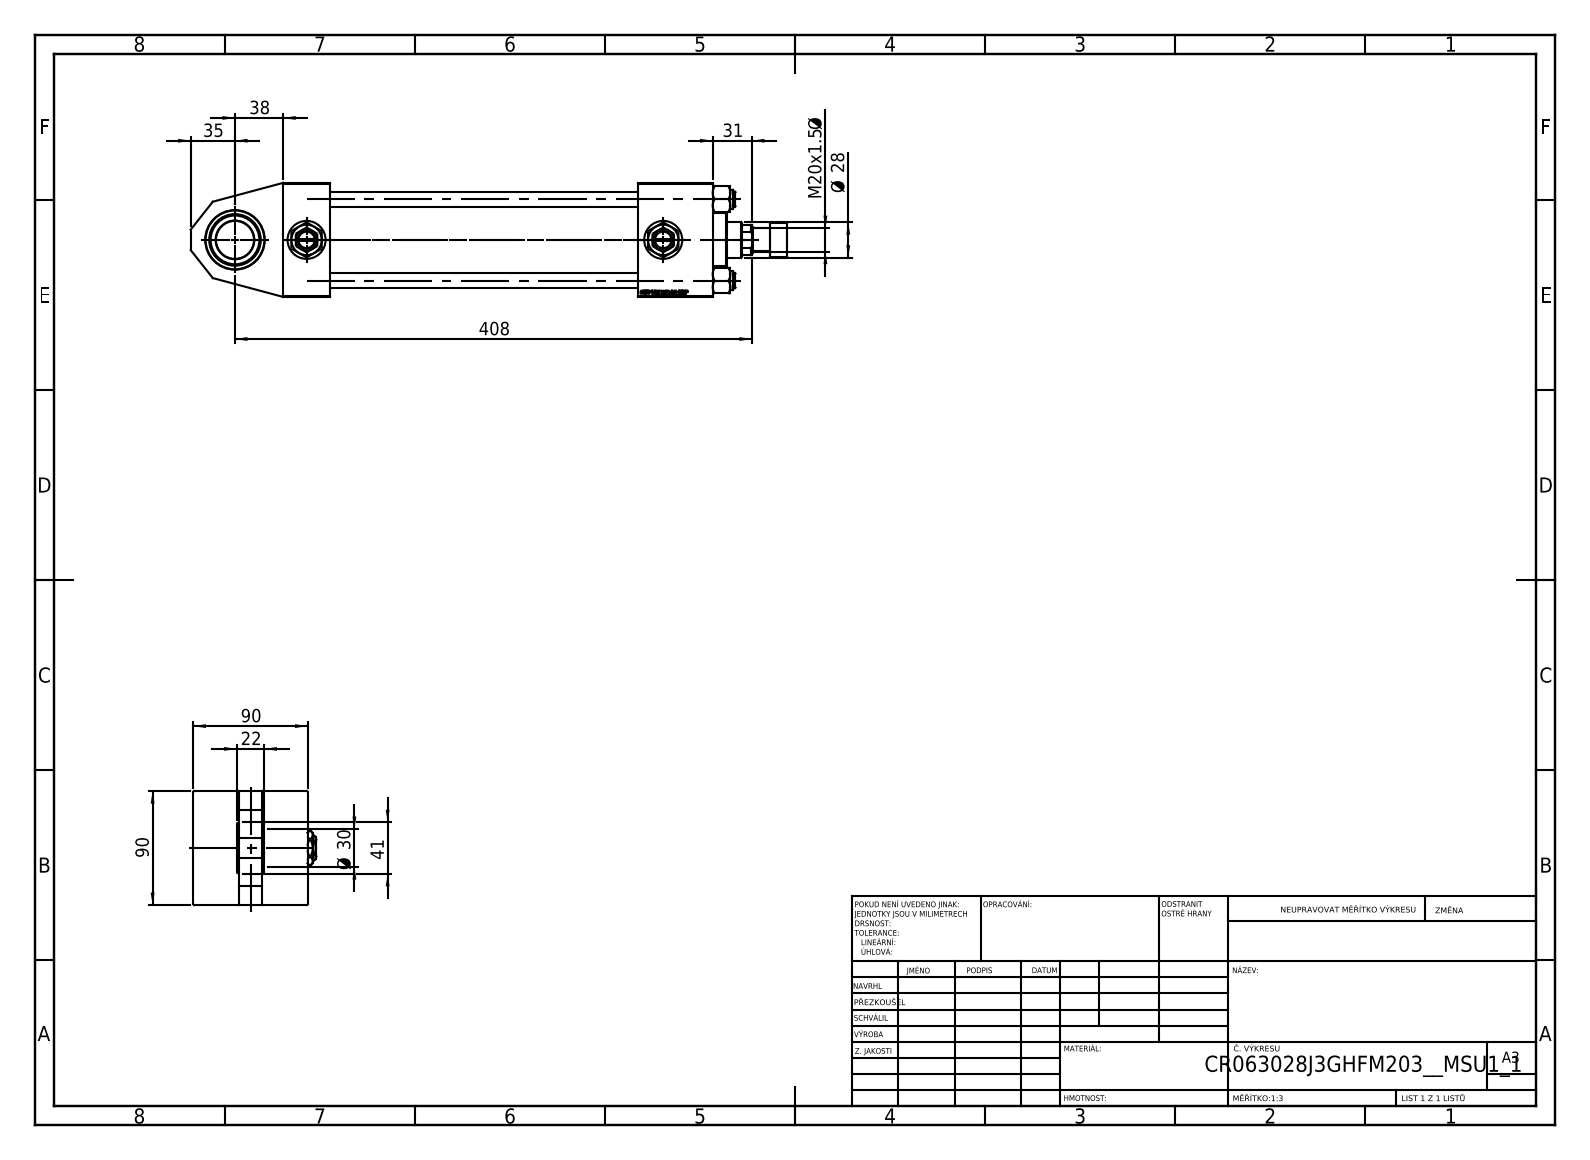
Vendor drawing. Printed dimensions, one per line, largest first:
408
90
90
41
38
35
31
Ø 30
Ø 28
22
M20x1.5 Ø
